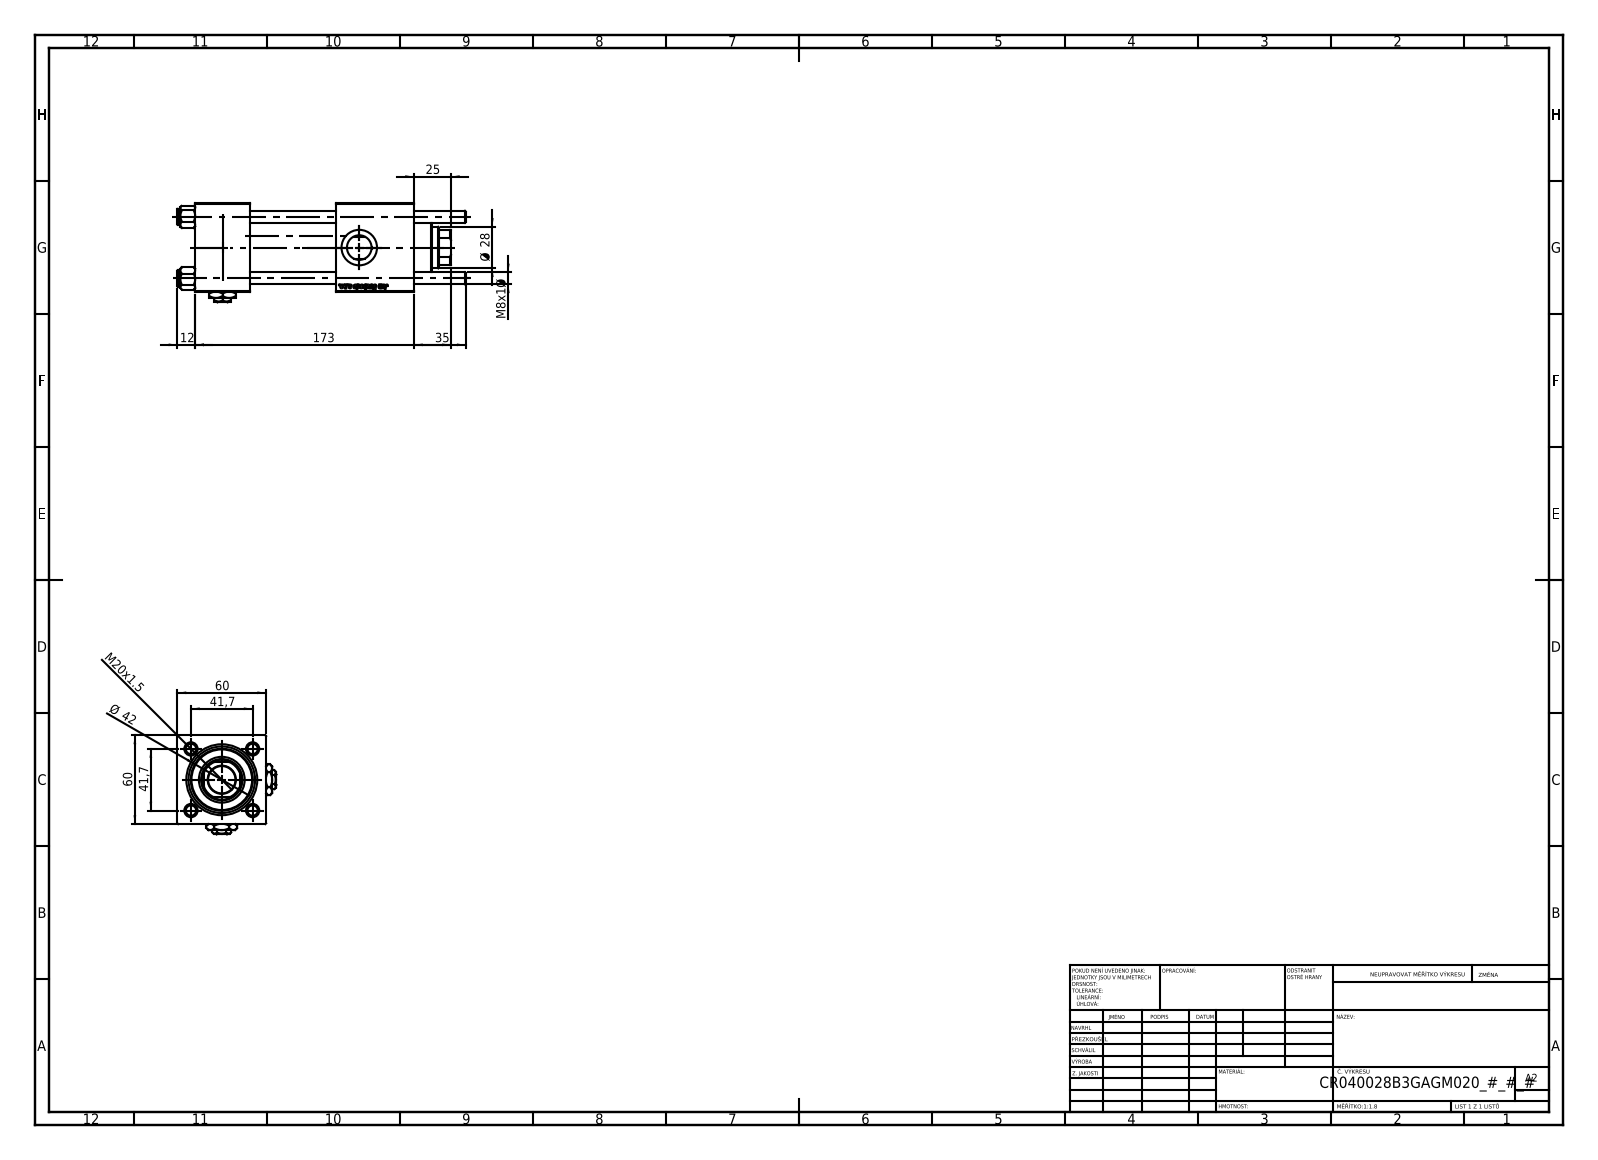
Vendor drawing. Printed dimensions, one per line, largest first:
173
60
60
Ø 42
41,7
41,7
35
Ø 28
25
M20x1.5
12
M8x1 Ø
